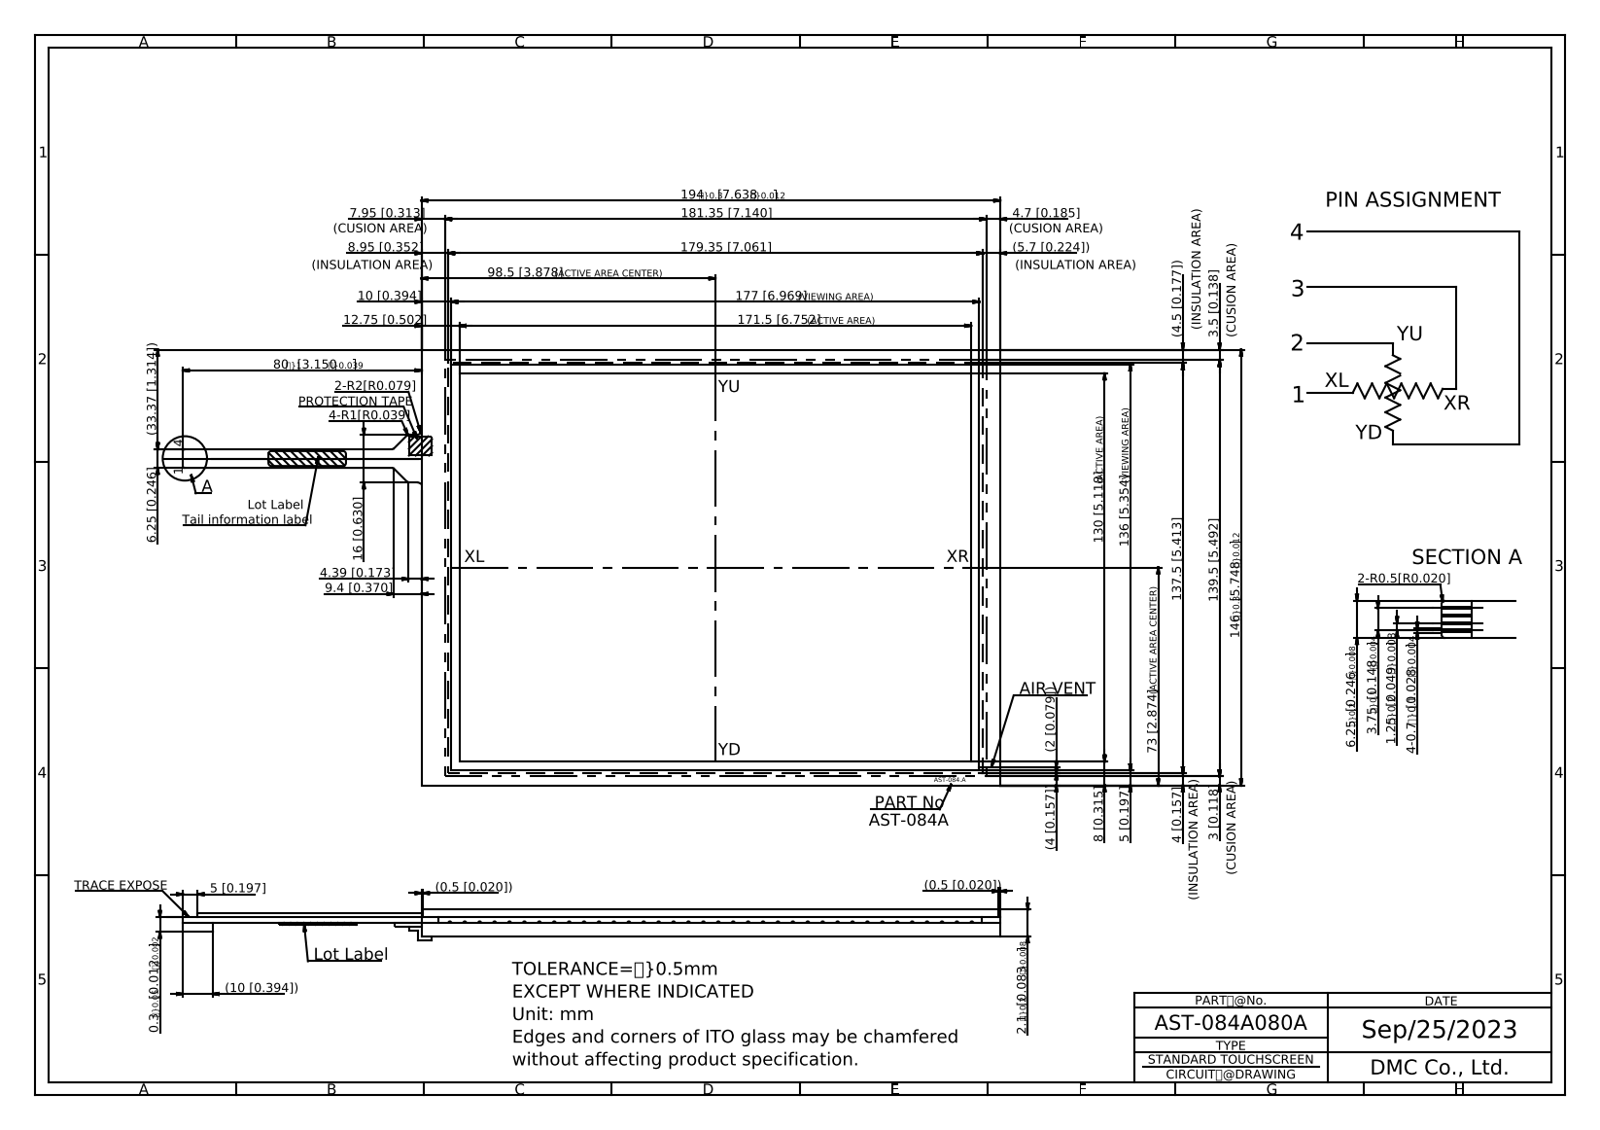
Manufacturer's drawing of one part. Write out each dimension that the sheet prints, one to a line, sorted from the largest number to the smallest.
194.000
181.35 [7.140]
179.35 [7.061]
177.000 {\H0.75x;(VIEWING AREA)}
171.500 {\H0.75x;(ACTIVE AREA)}
146.000
139.5 [5.492]
137.5 [5.413]
136.000 {\H0.75x;(VIEWING AREA)}
130.000 {\H0.75x;(ACTIVE AREA)}
98.500 {\H0.75x;(ACTIVE AREA CENTER)}
80.000
73.000 {\H0.75x;(ACTIVE AREA CENTER)}
(33.37 [1.314])
16 [0.630]
12.75 [0.502]
10 [0.394]
(10 [0.394])
9.4 [0.370]
8.95 [0.352]
8 [0.315]
7.95 [0.313]
6.25{\H0.6667x;?}0.2}[0.246{\H0.6667x;?}0.008}]
6.25 [0.246]
(5.7 [0.224])
5 [0.197]
5 [0.197]
4.7 [0.185]
(4.5 [0.177])
4.39 [0.173]
4 [0.157]
4-0.7{\H0.83333x;?}0.1}[0.028{\H0.83333x;?}0.004}]
(4 [0.157])
3.75{\H0.66667x;?}0.1}[0.148{\H0.66667x;?}0.004}]
3.5 [0.138]
3 [0.118]
2.1{\H0.6875x;?}0.2}[0.083{\H0.6667x;?}0.008}]
(2 [0.079])
1.25{\H0.83333x;?}0.2}[0.049{\H0.83333x;?}0.008}]
(0.5 [0.020])
(0.5 [0.020])
0.3{\H0.6563x;?}0.05}[0.012{\H0.6563x;?}0.002}]
